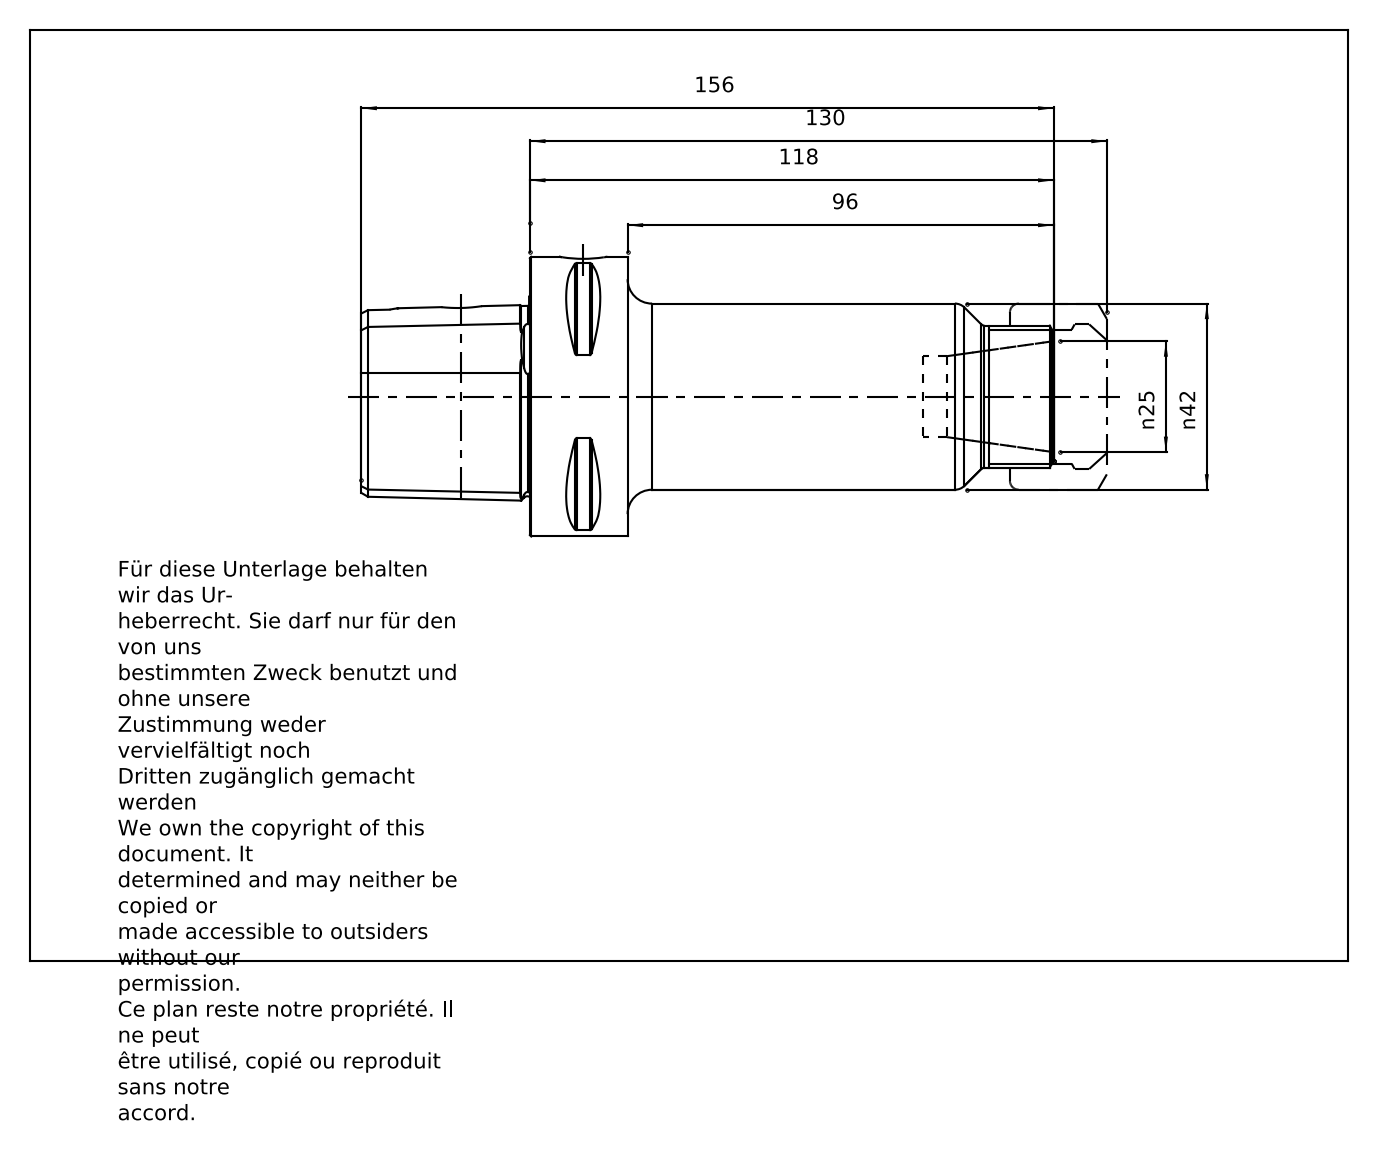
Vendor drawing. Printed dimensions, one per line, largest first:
156
130
118
96
n42
n25
